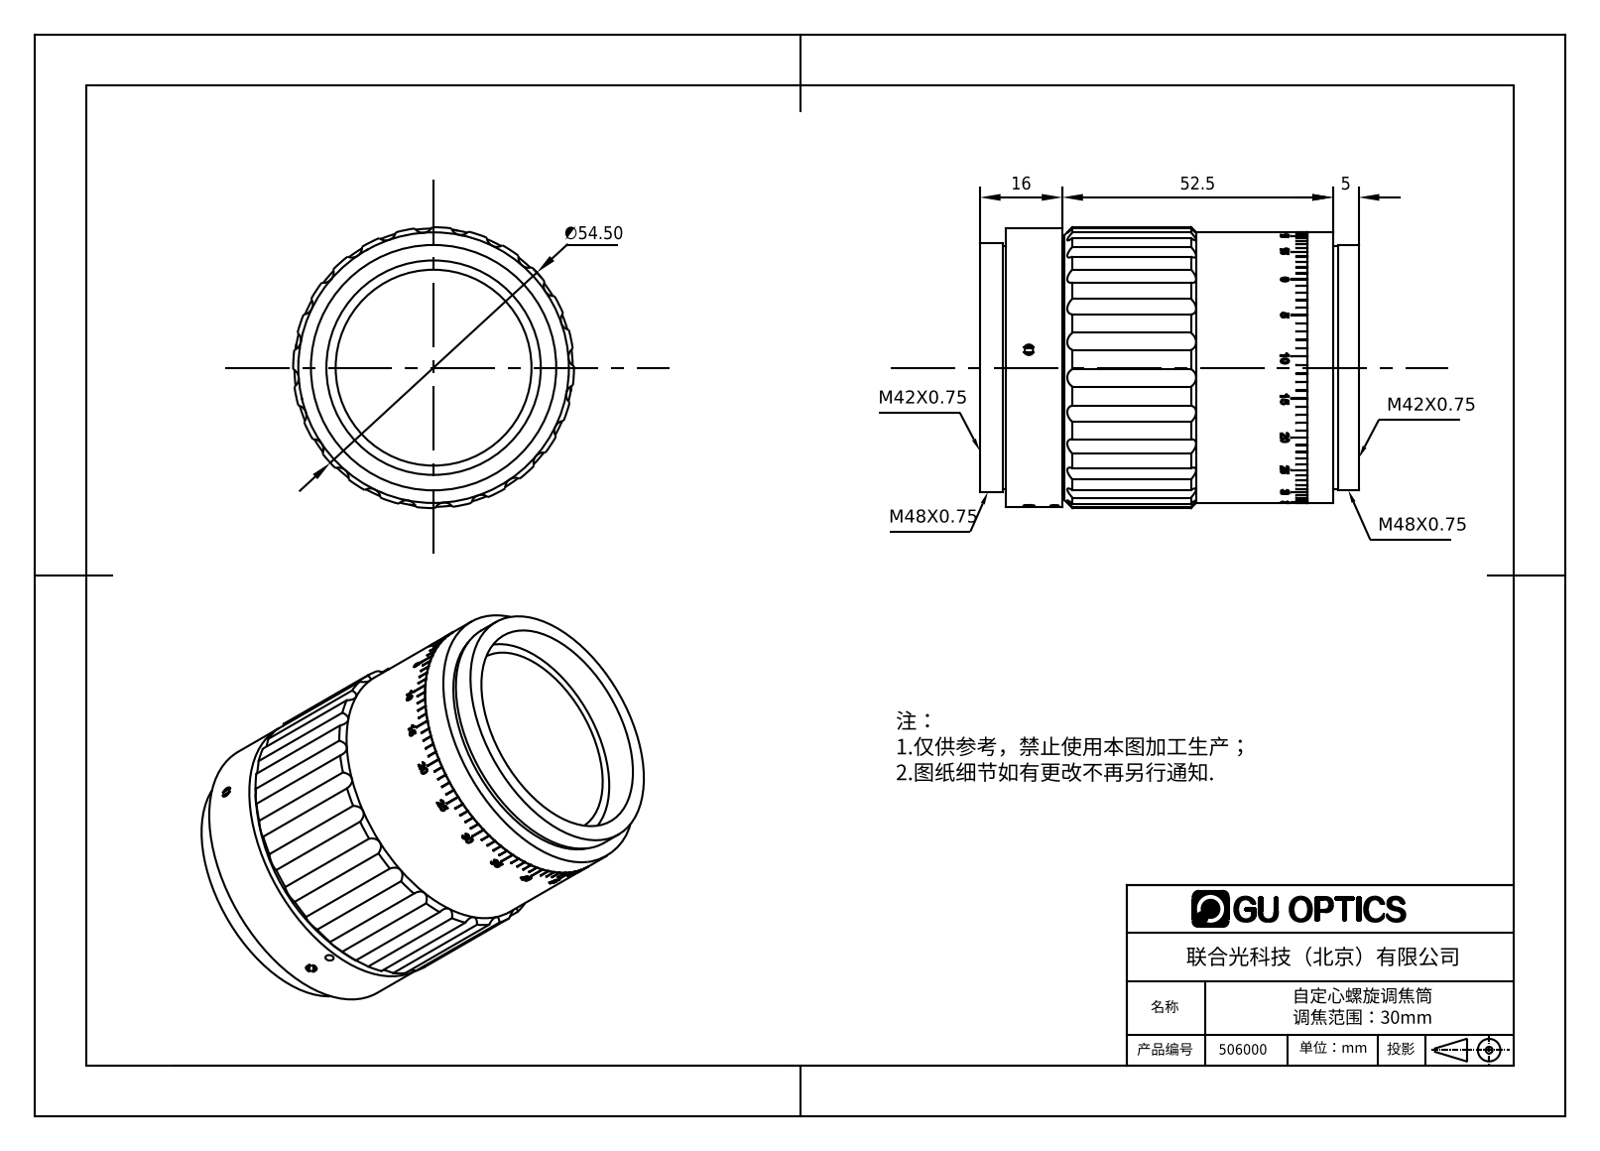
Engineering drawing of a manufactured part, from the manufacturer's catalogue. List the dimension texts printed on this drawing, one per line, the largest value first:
∅54.50
52.5
16
5
